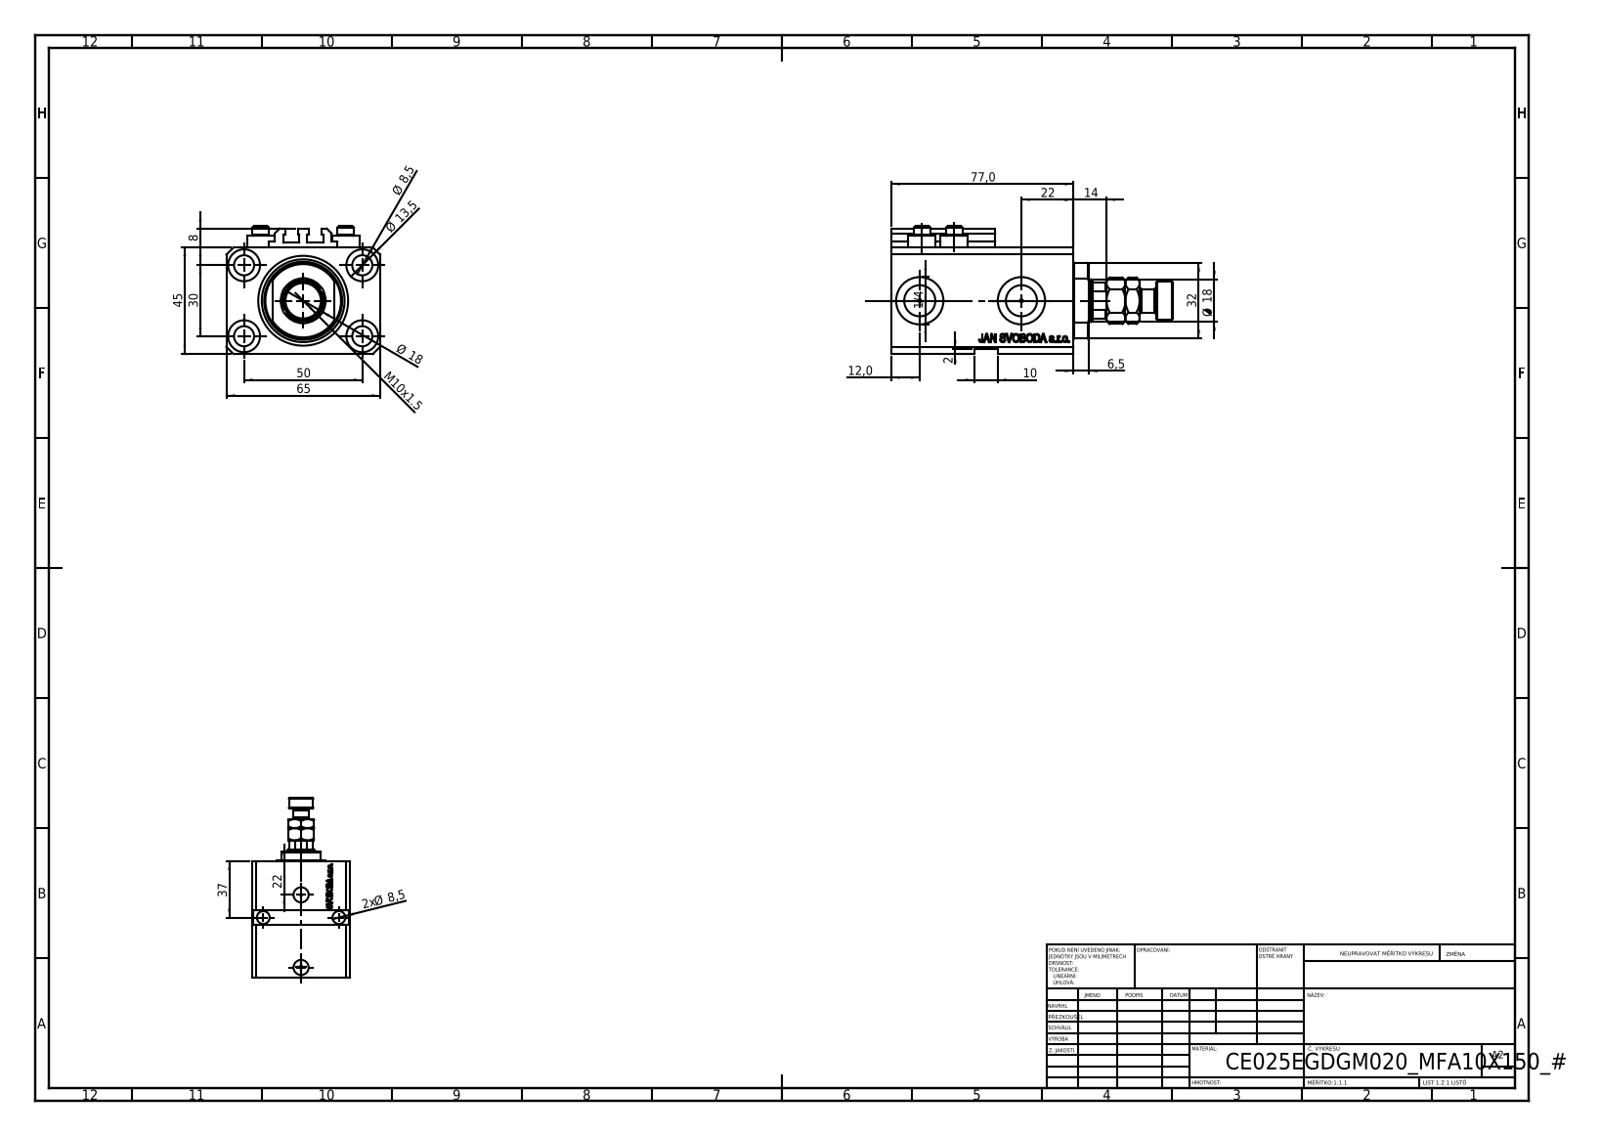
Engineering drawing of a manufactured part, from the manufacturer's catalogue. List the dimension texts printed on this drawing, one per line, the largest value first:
77,0
65
50
45
37
32
30
22
22
Ø 18
Ø 18
14
Ø 13,5
12,0
M10x1.5
10
Ø 8,5
2x Ø 8,5
8
6,5
2
1/4
